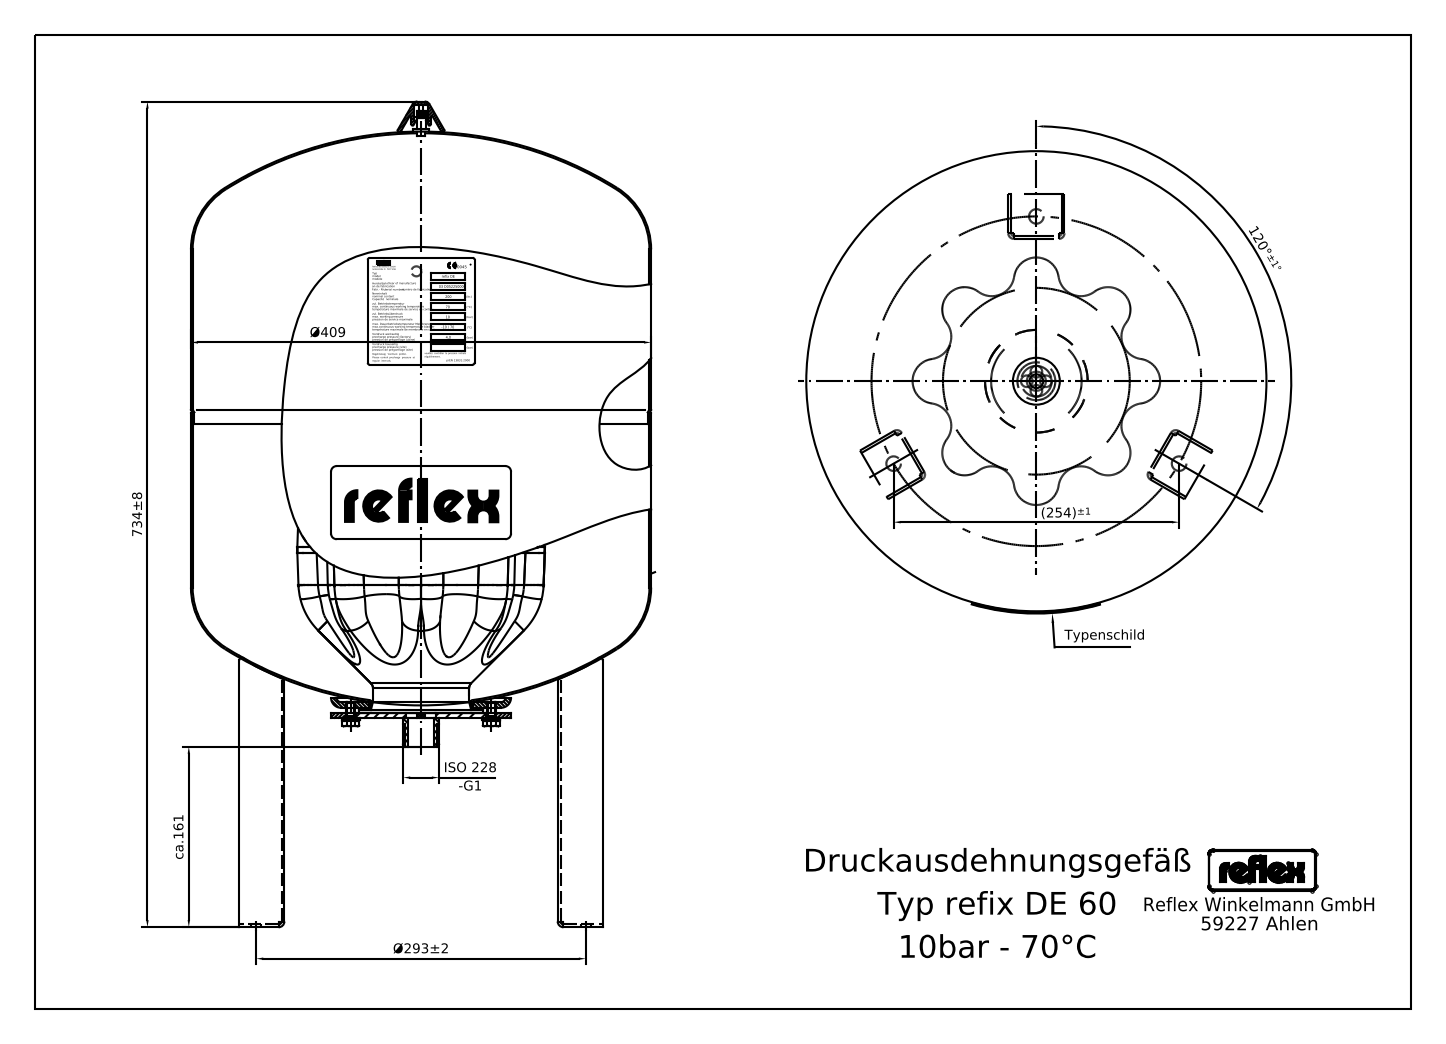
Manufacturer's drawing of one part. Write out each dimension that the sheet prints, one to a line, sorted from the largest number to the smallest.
734±8
Ø409
Ø293±2
(254)±1
ISO 228 -G1
120°±1°
ca.161
